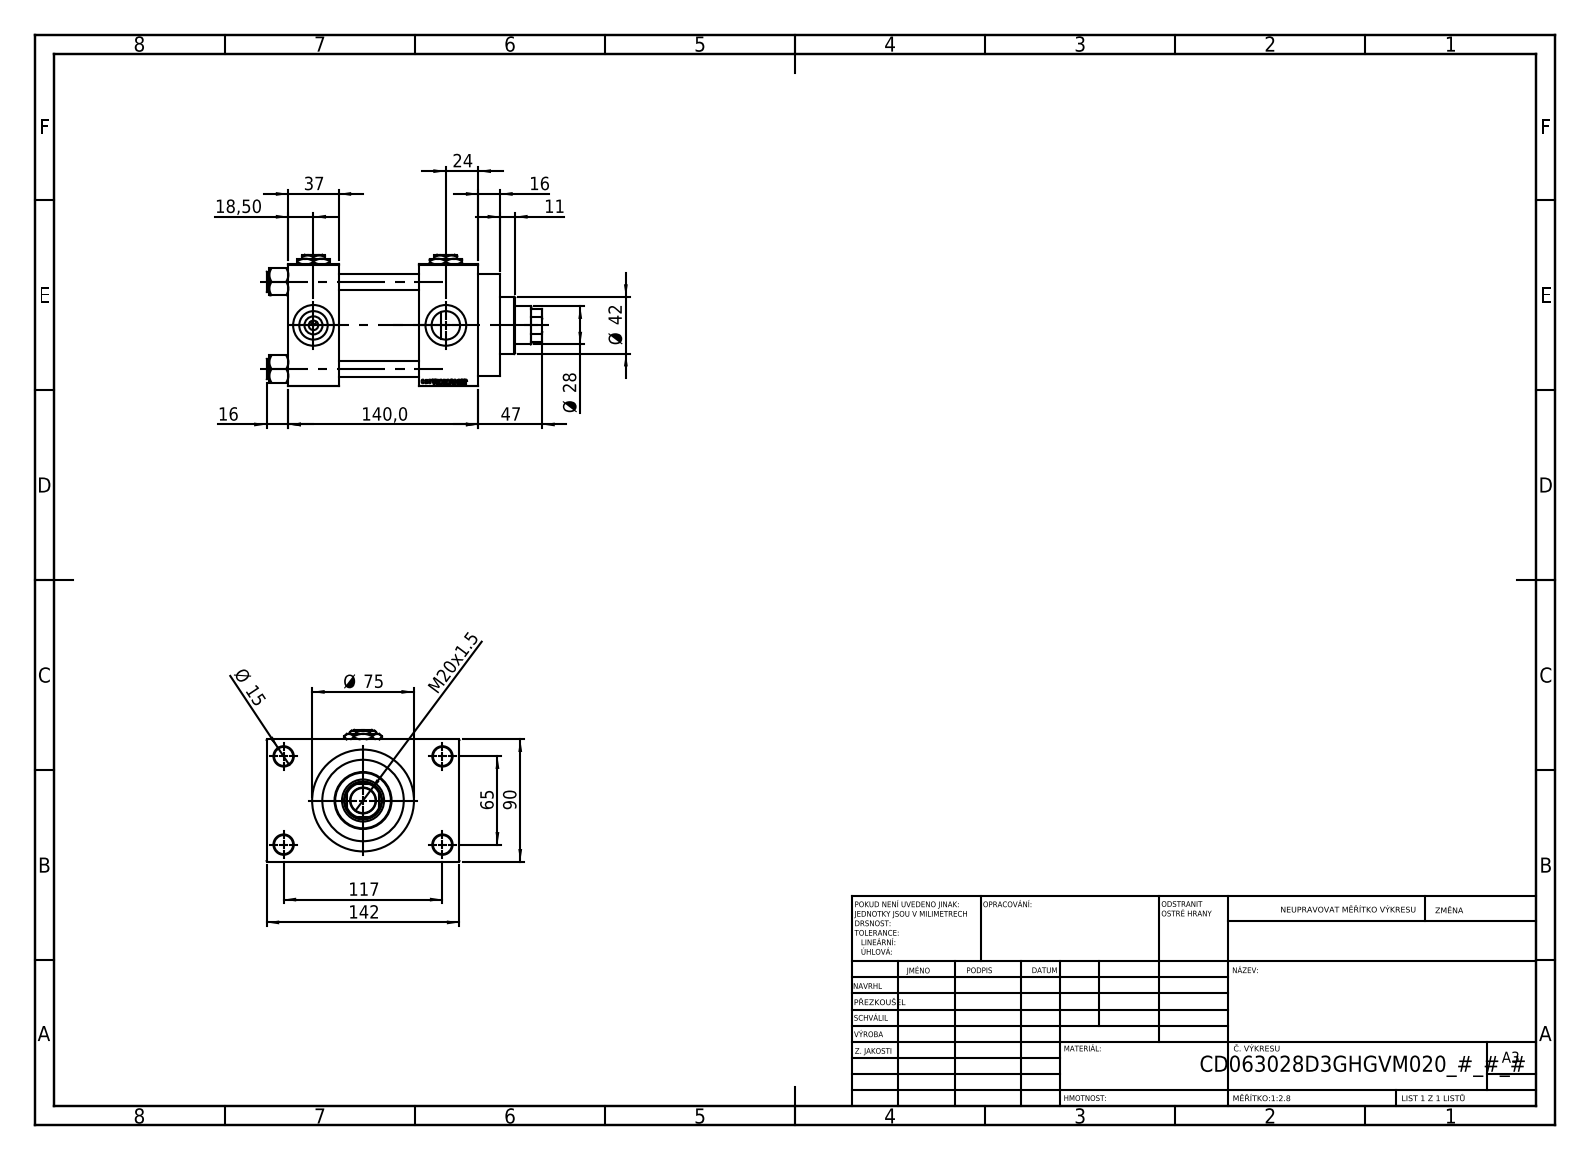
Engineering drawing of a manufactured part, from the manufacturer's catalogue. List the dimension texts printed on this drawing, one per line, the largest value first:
142
140,0
117
90
Ø 75
65
47
Ø 42
37
Ø 28
24
M20x1.5
18,50
16
16
Ø 15
11
